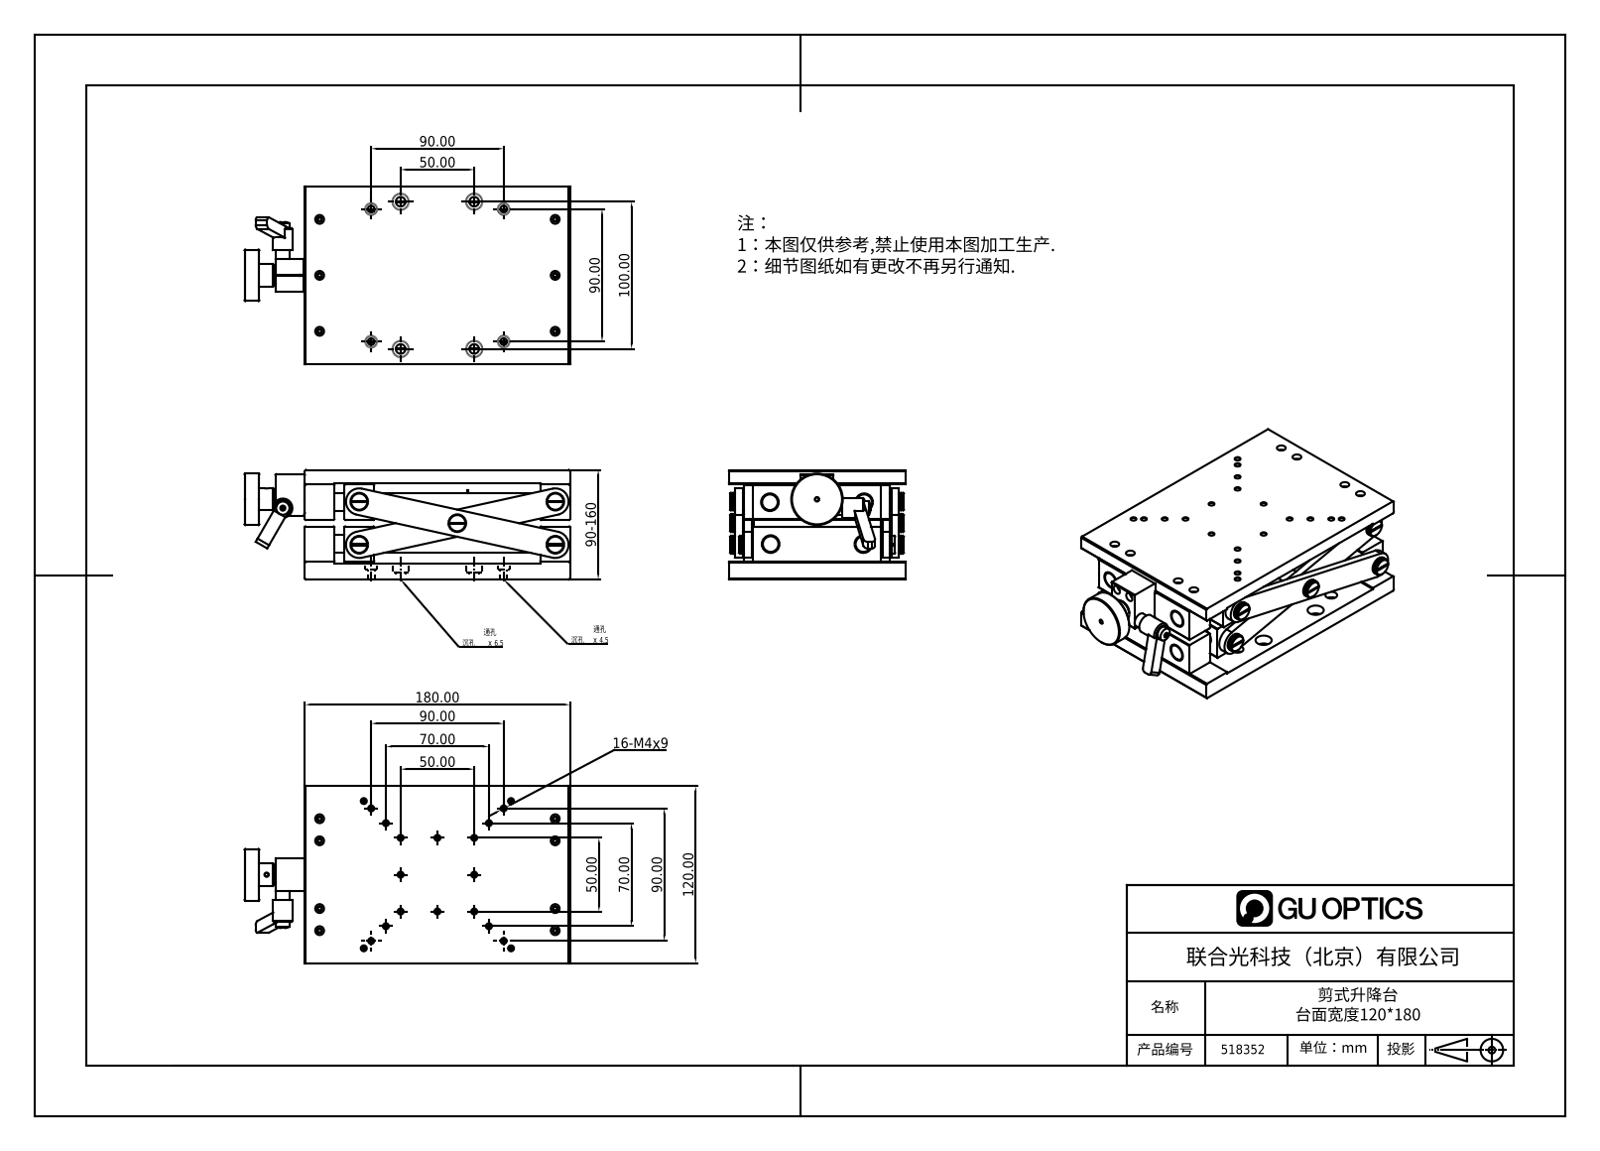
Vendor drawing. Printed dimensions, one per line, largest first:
180.00
120.00
100.00
90.00
90.00
90-160
90.00
90.00
70.00
70.00
50.00
50.00
50.00
16-M4x9
